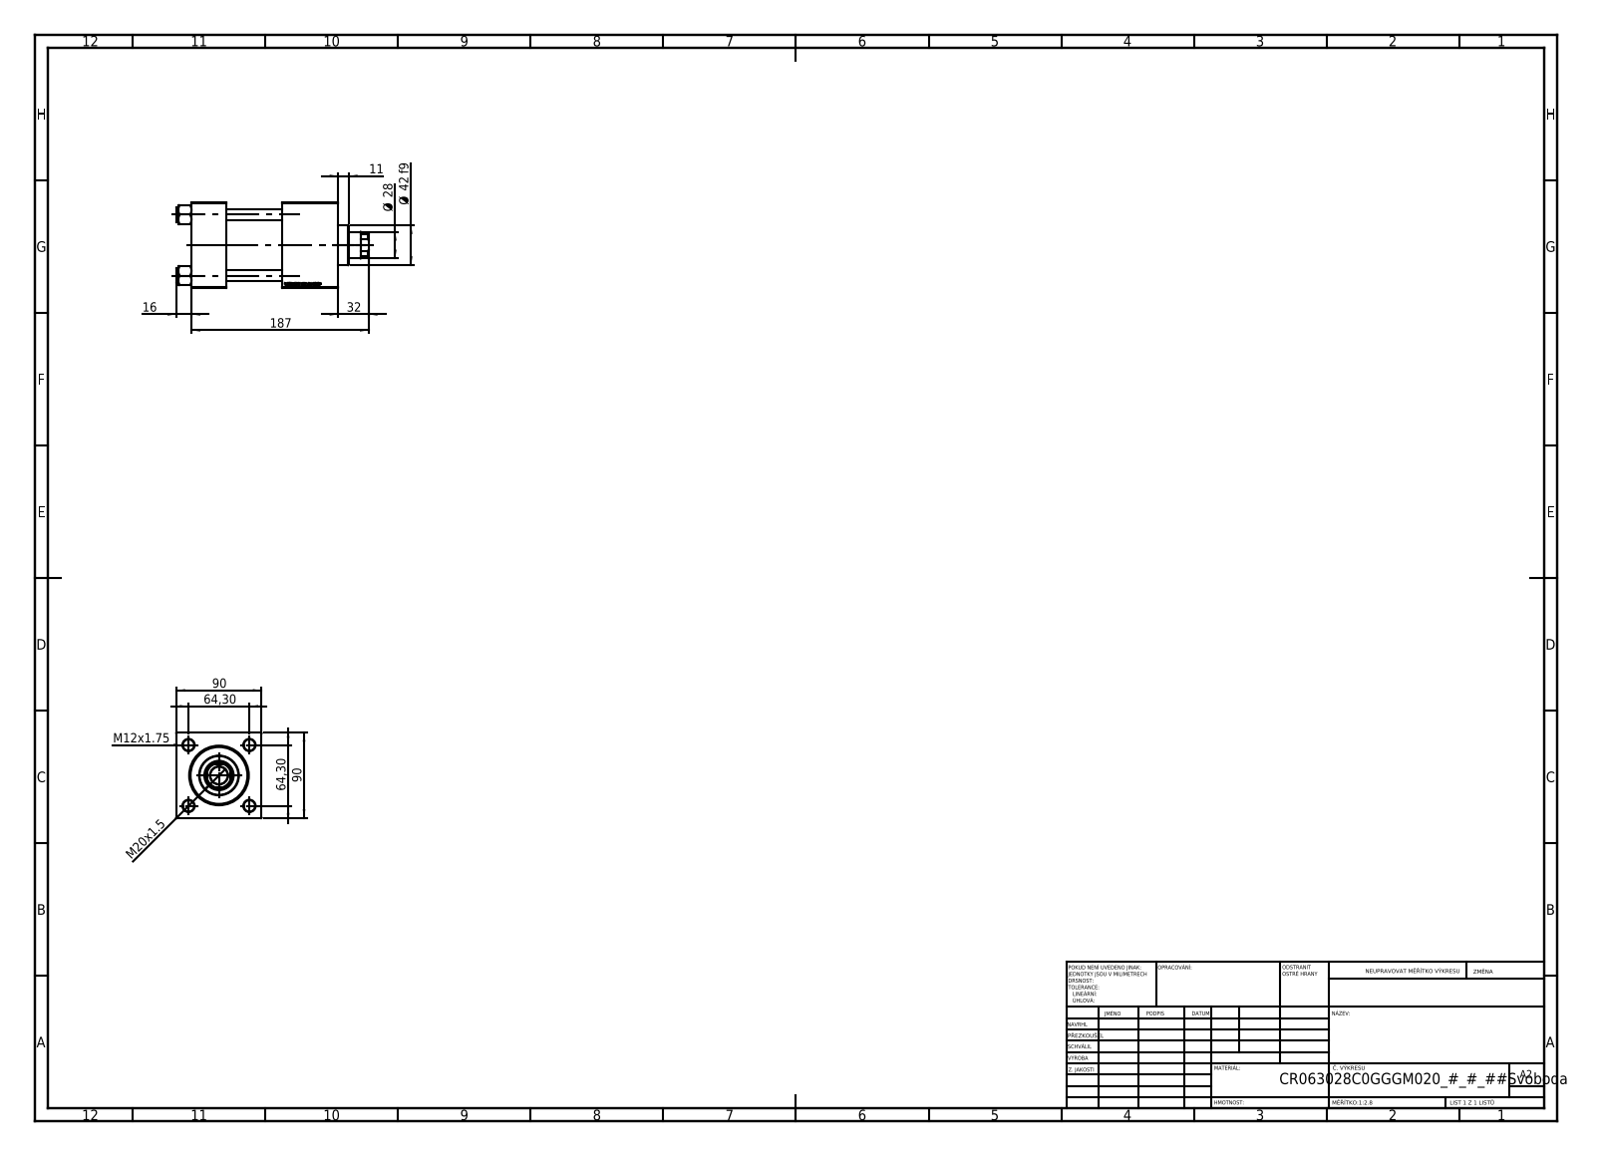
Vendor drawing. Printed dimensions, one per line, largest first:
187
90
90
64,30
64,30
Ø 42 f9
32
Ø 28
M20x1.5
16
M12x1.75
11
